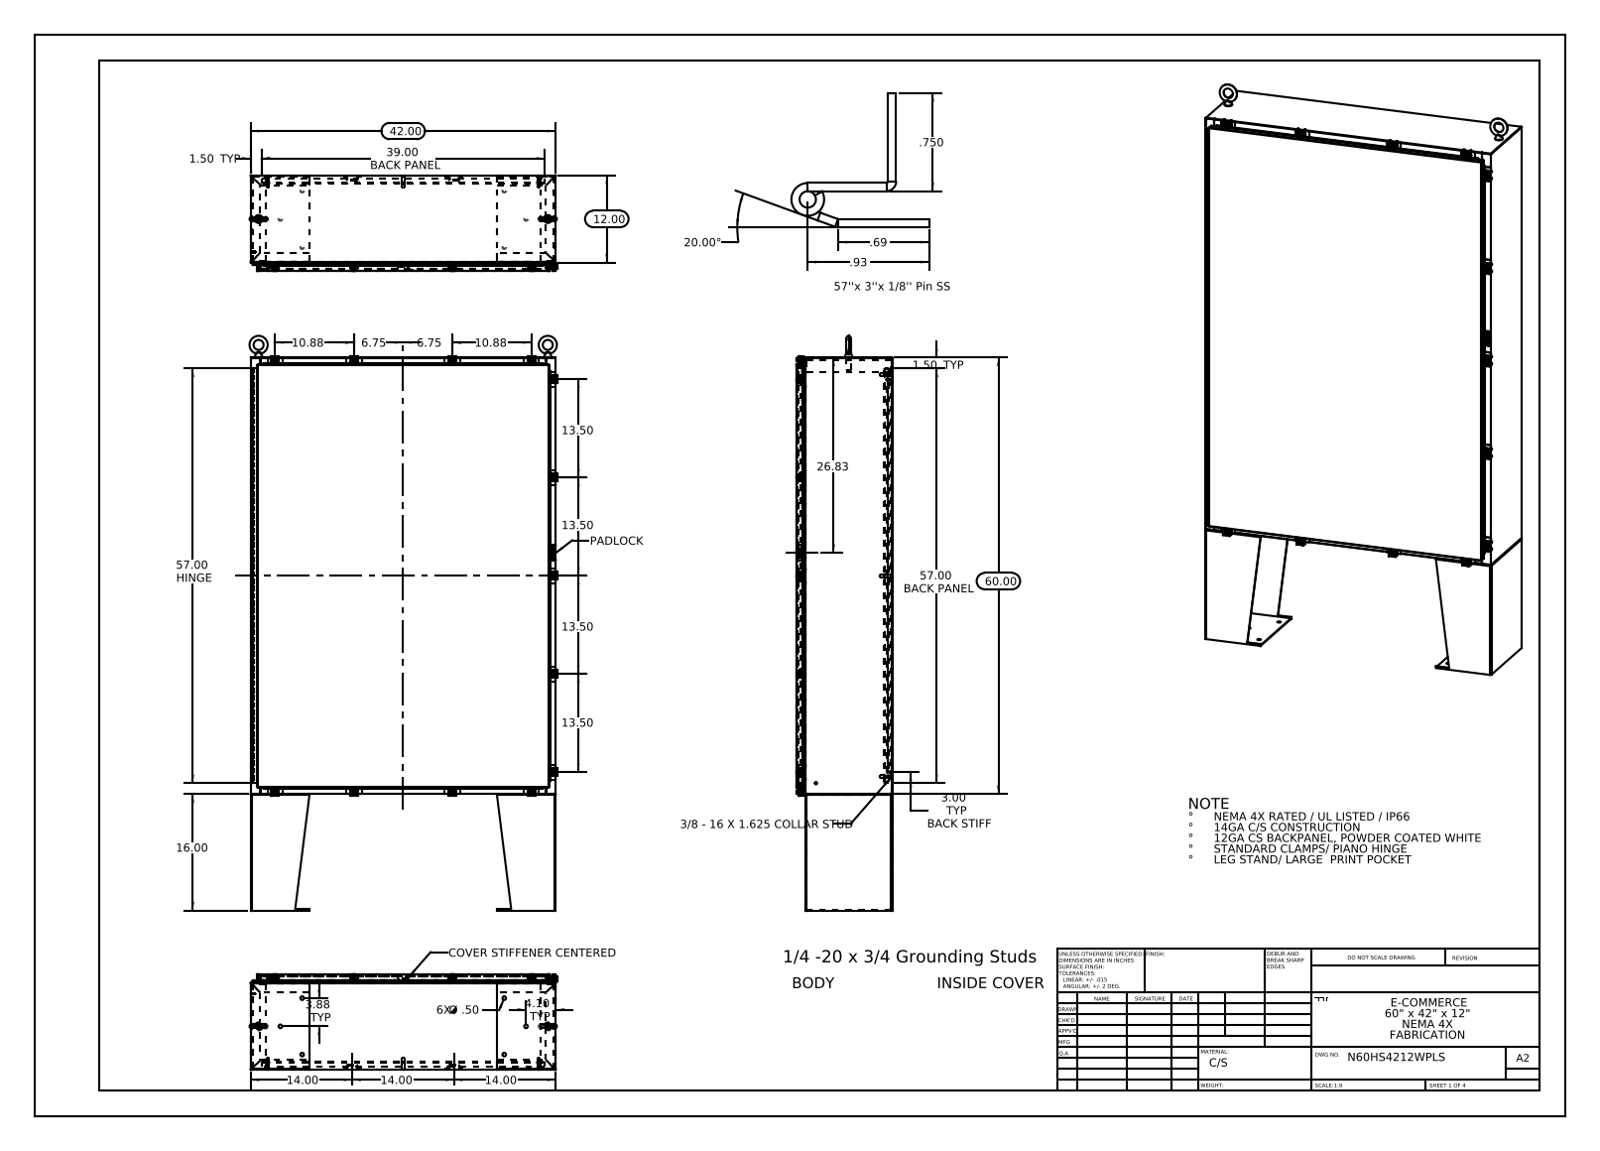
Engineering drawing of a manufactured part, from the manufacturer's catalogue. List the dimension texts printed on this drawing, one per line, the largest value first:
60.00
57.00 HINGE
57.00 BACK PANEL
42.00
39.00 BACK PANEL
26.83
20.00°
16.00
14.00
14.00
14.00
13.50
13.50
13.50
13.50
12.00
10.88
10.88
6.75
6.75
4.10 TYP
3.88 TYP
3.00 TYP BACK STIFF
1.50 TYP
1.50 TYP
.93
.750
.69
6X Ø .50
